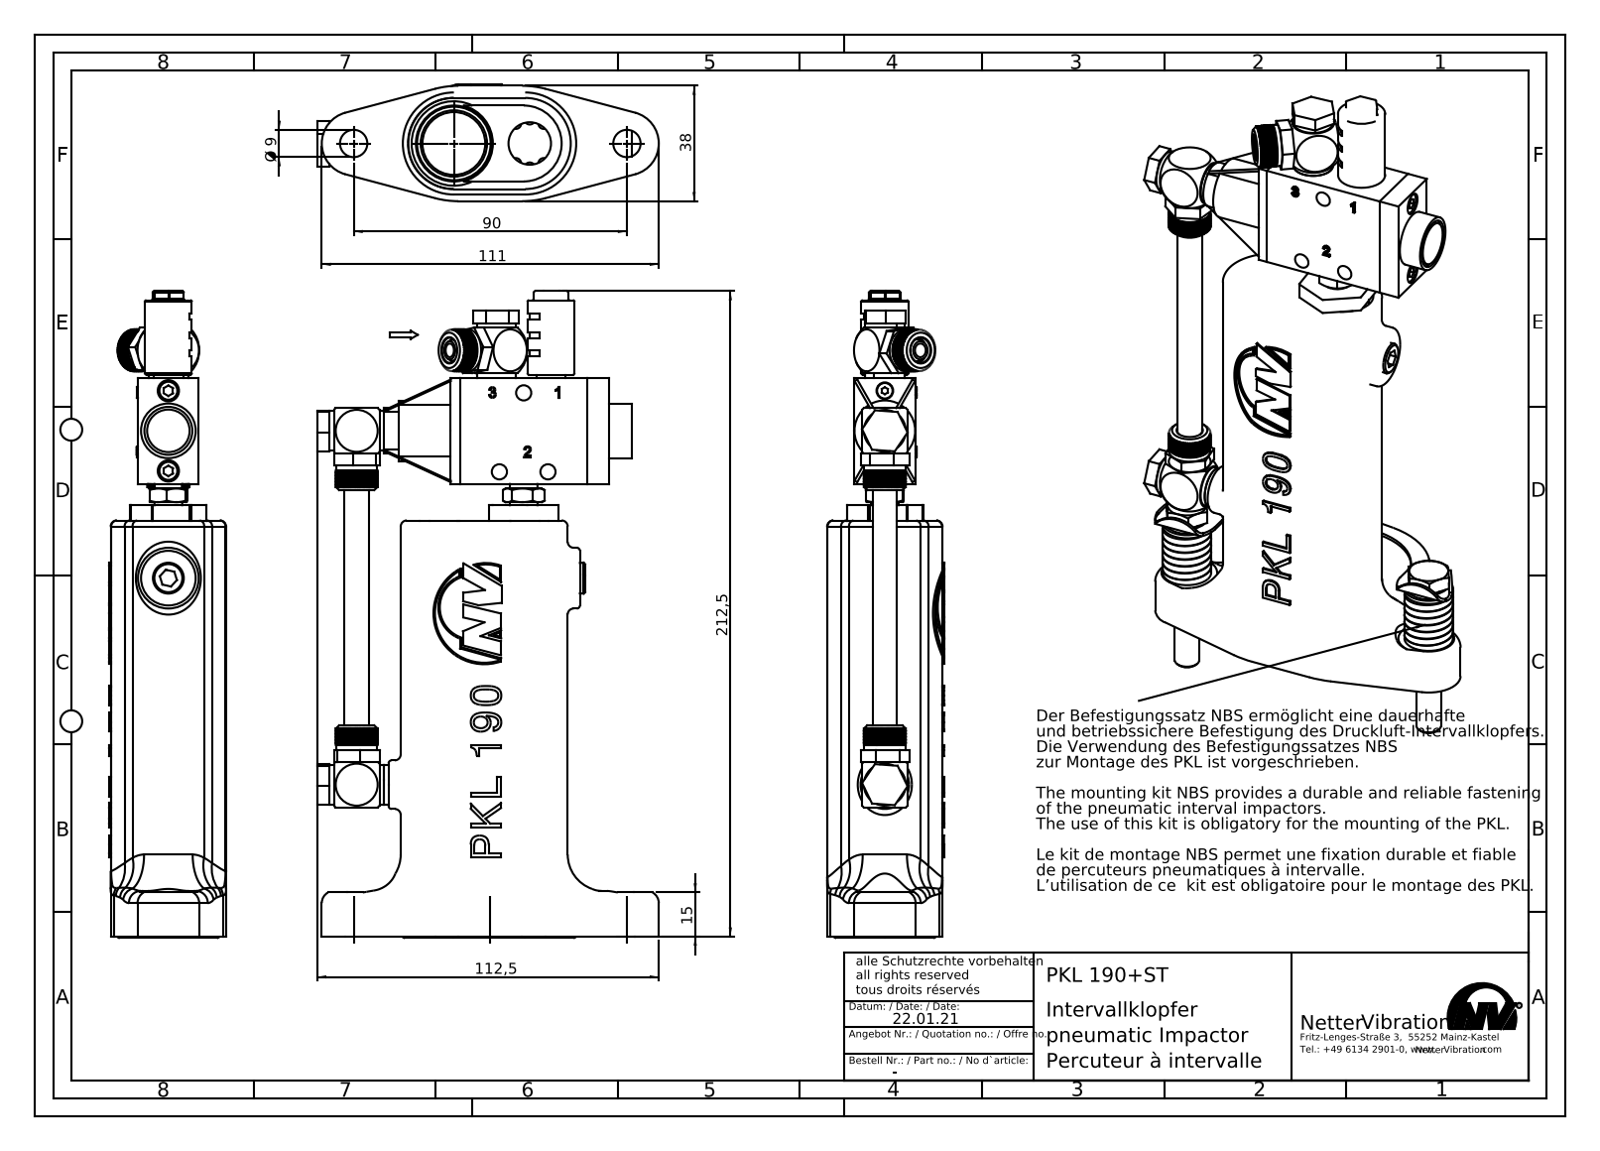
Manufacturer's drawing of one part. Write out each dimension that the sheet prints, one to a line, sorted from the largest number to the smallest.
212,5
112,5
111
90
38
15
Ø 9
